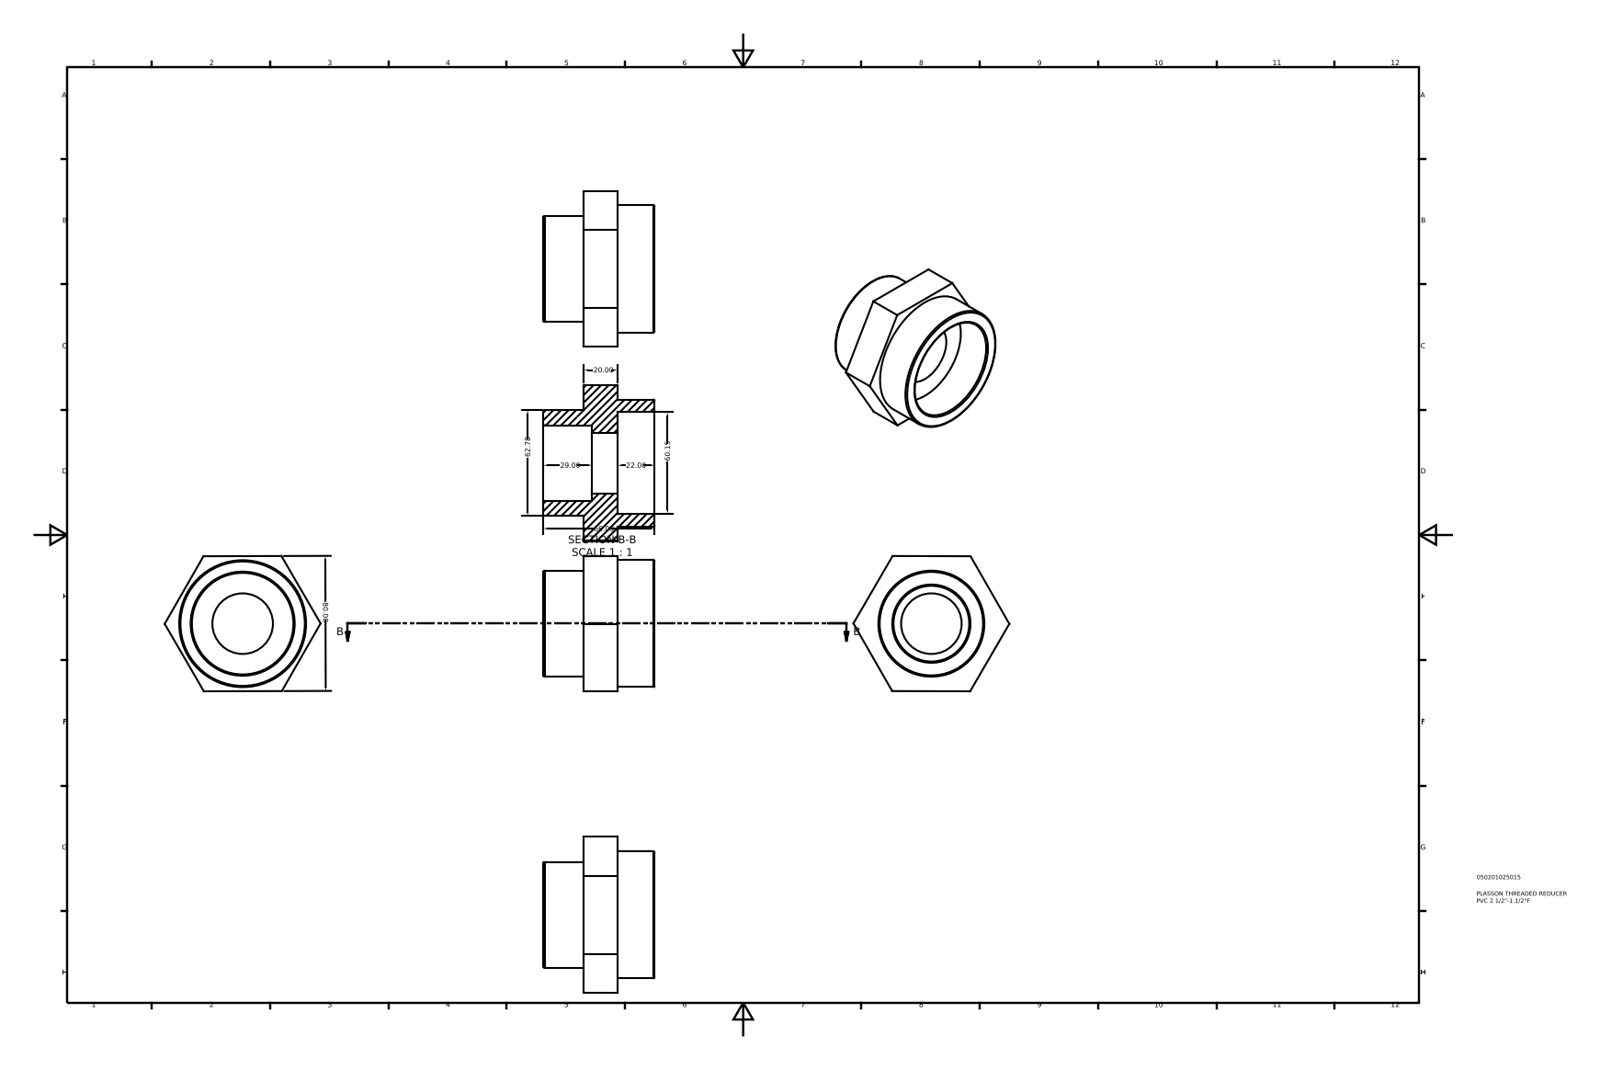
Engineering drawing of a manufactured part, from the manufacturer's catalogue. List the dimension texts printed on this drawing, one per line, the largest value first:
80.00
66.00
62.78
60.15
29.00
22.00
20.00
